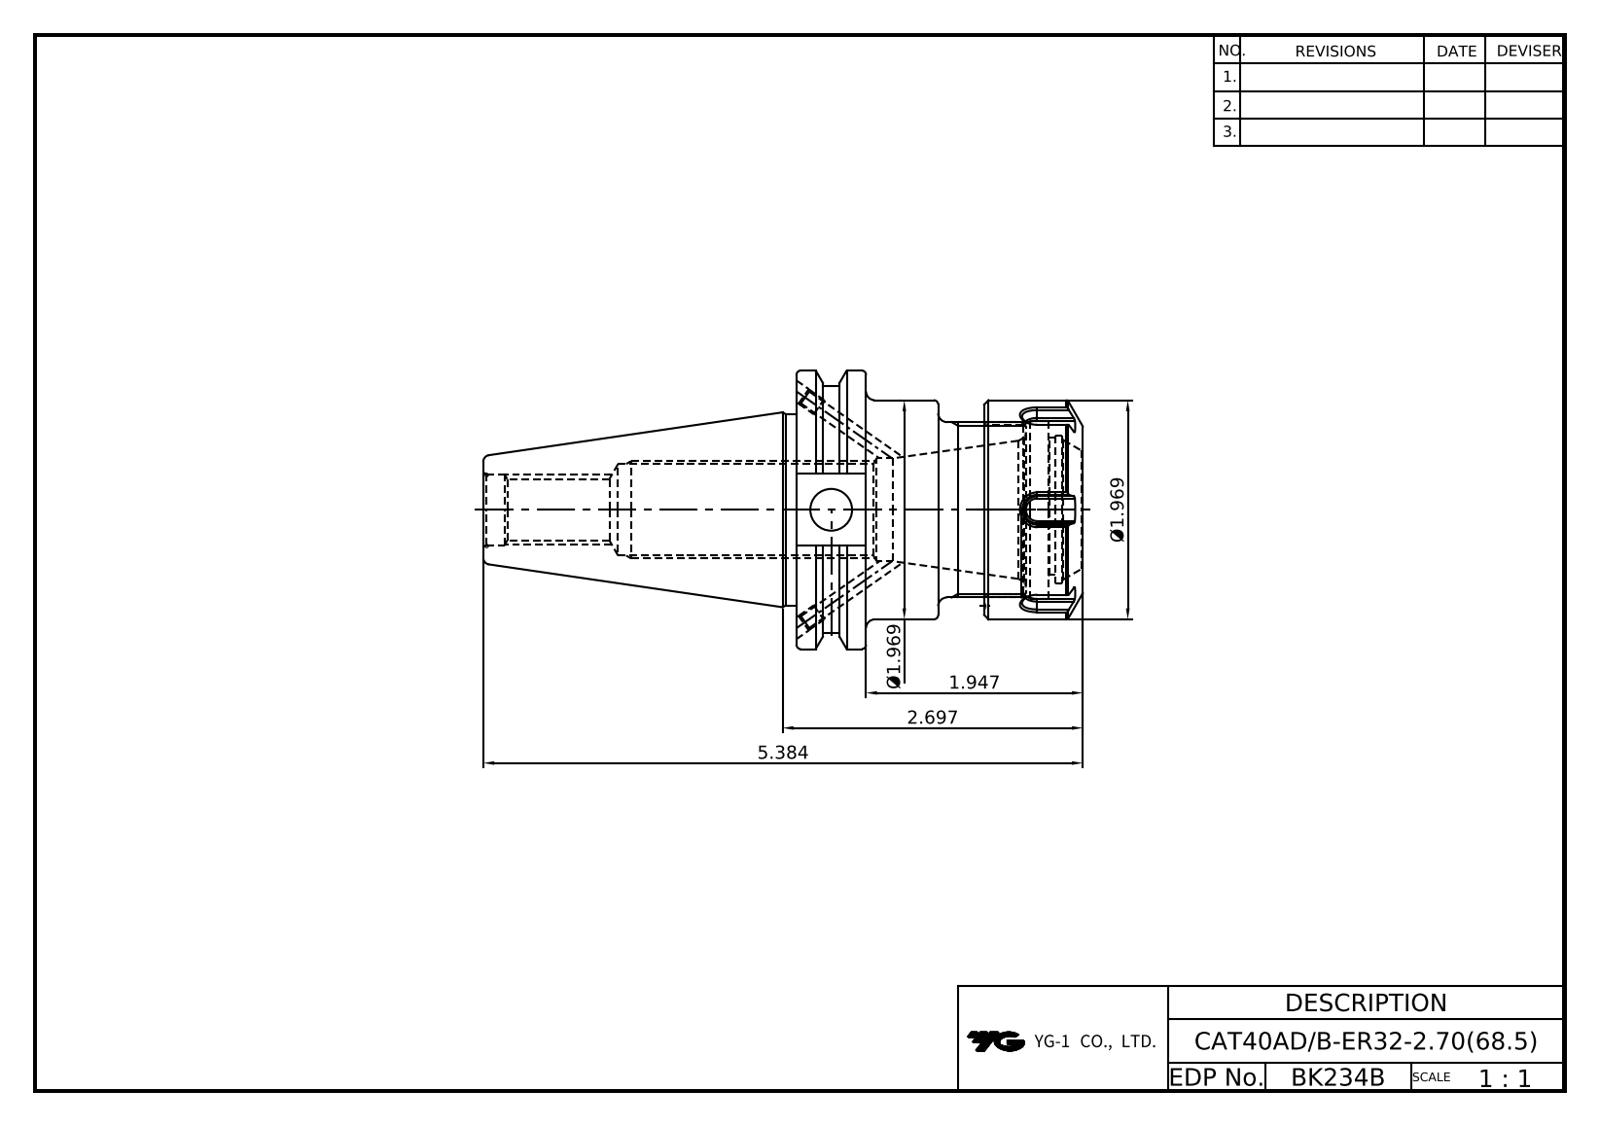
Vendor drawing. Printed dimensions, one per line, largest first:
5.384
2.697
Ø1.969
Ø1.969
1.947
